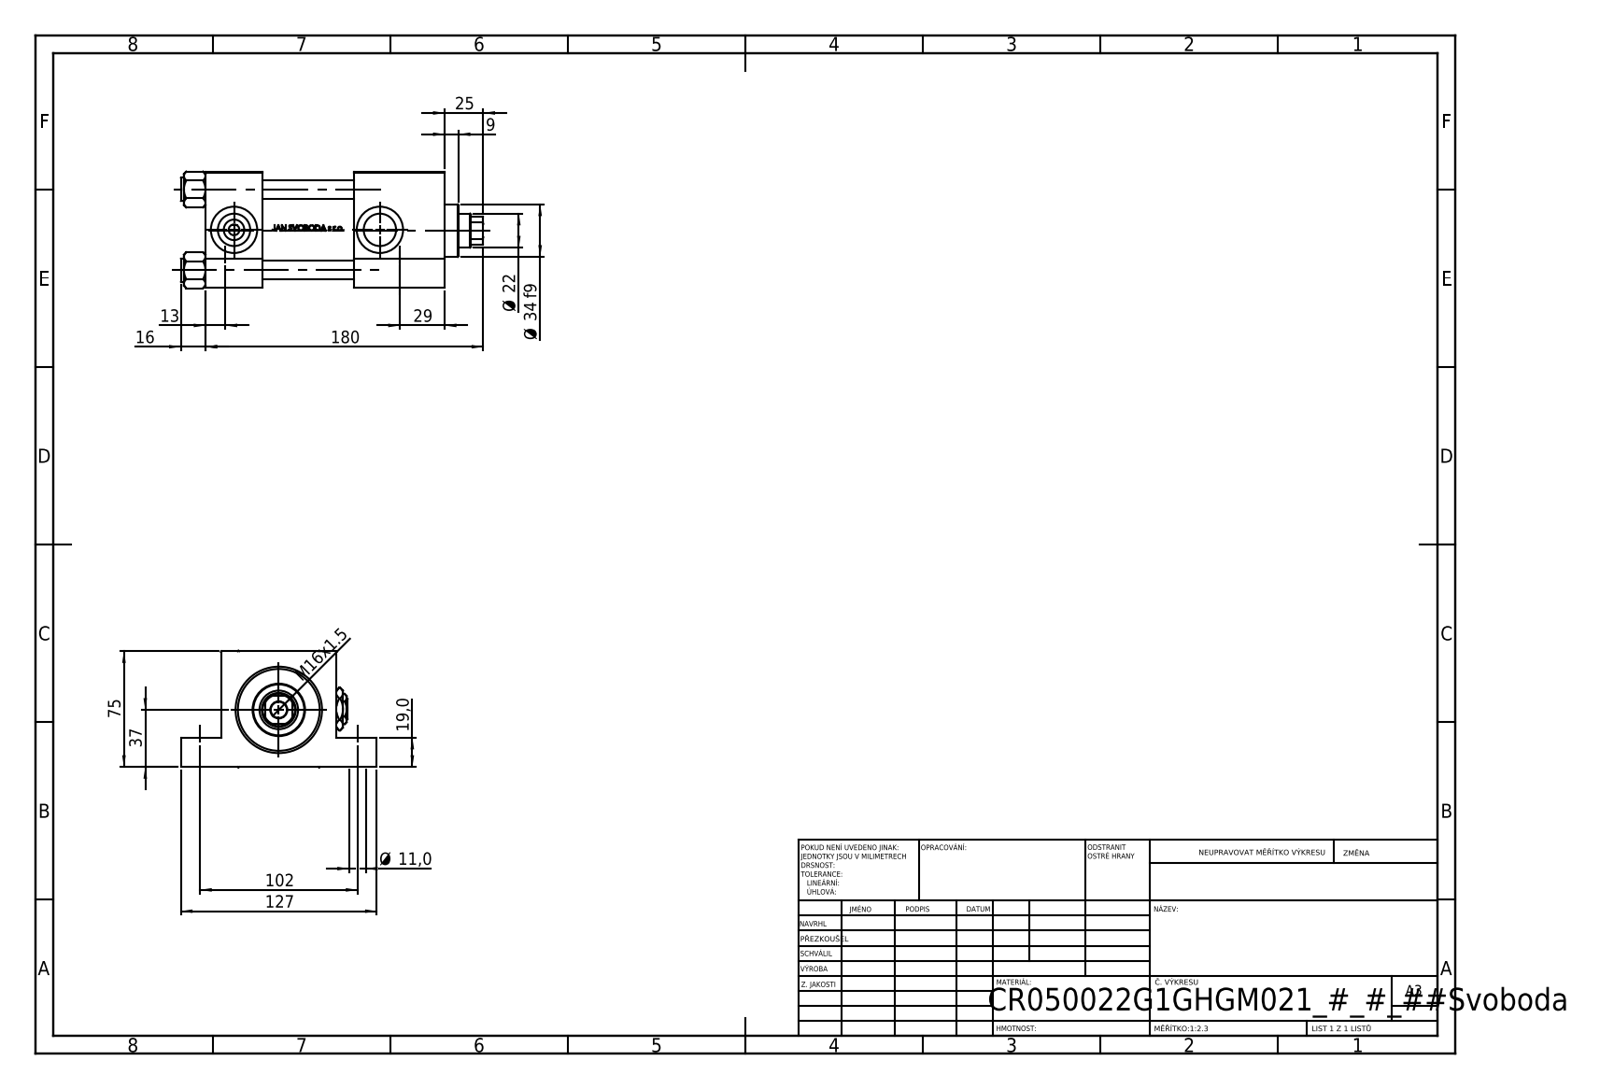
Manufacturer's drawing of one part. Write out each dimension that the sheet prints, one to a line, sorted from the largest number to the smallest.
180
127
102
75
37
Ø 34 f9
29
25
Ø 22
19,0
16
M16x1.5
13
Ø 11,0
9
